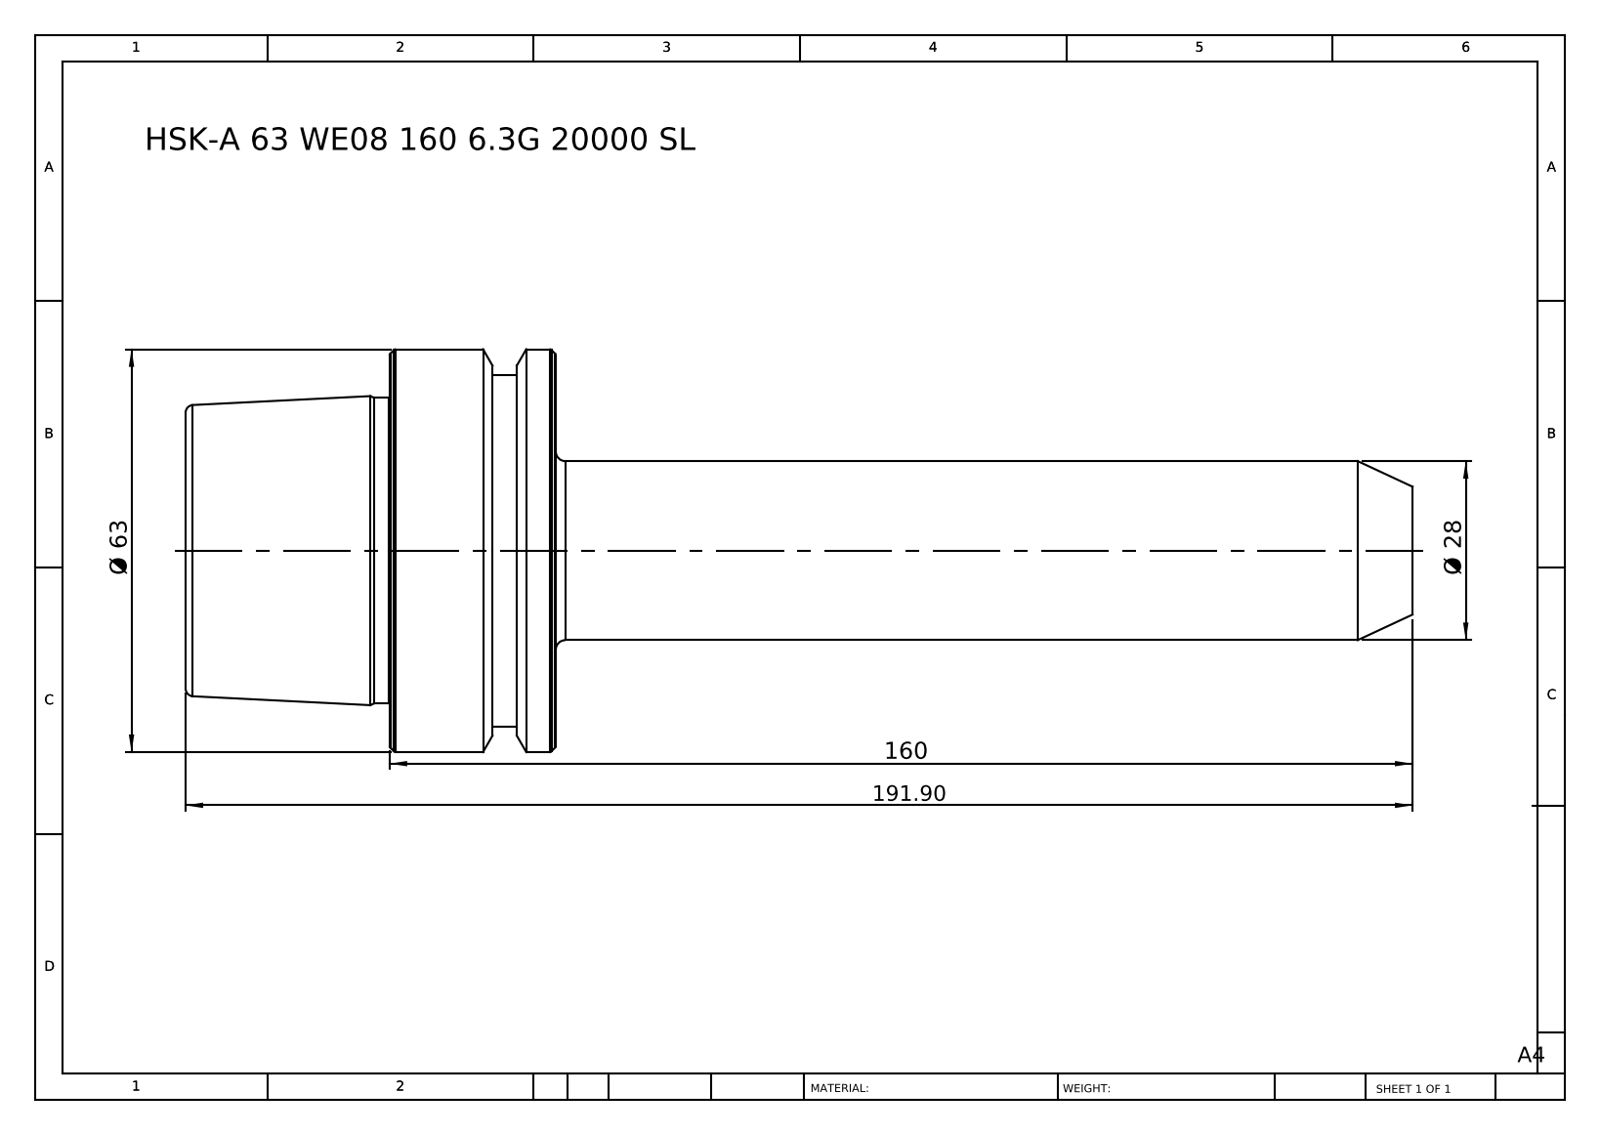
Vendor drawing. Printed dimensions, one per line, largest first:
191.90
160
Ø 63
Ø 28
